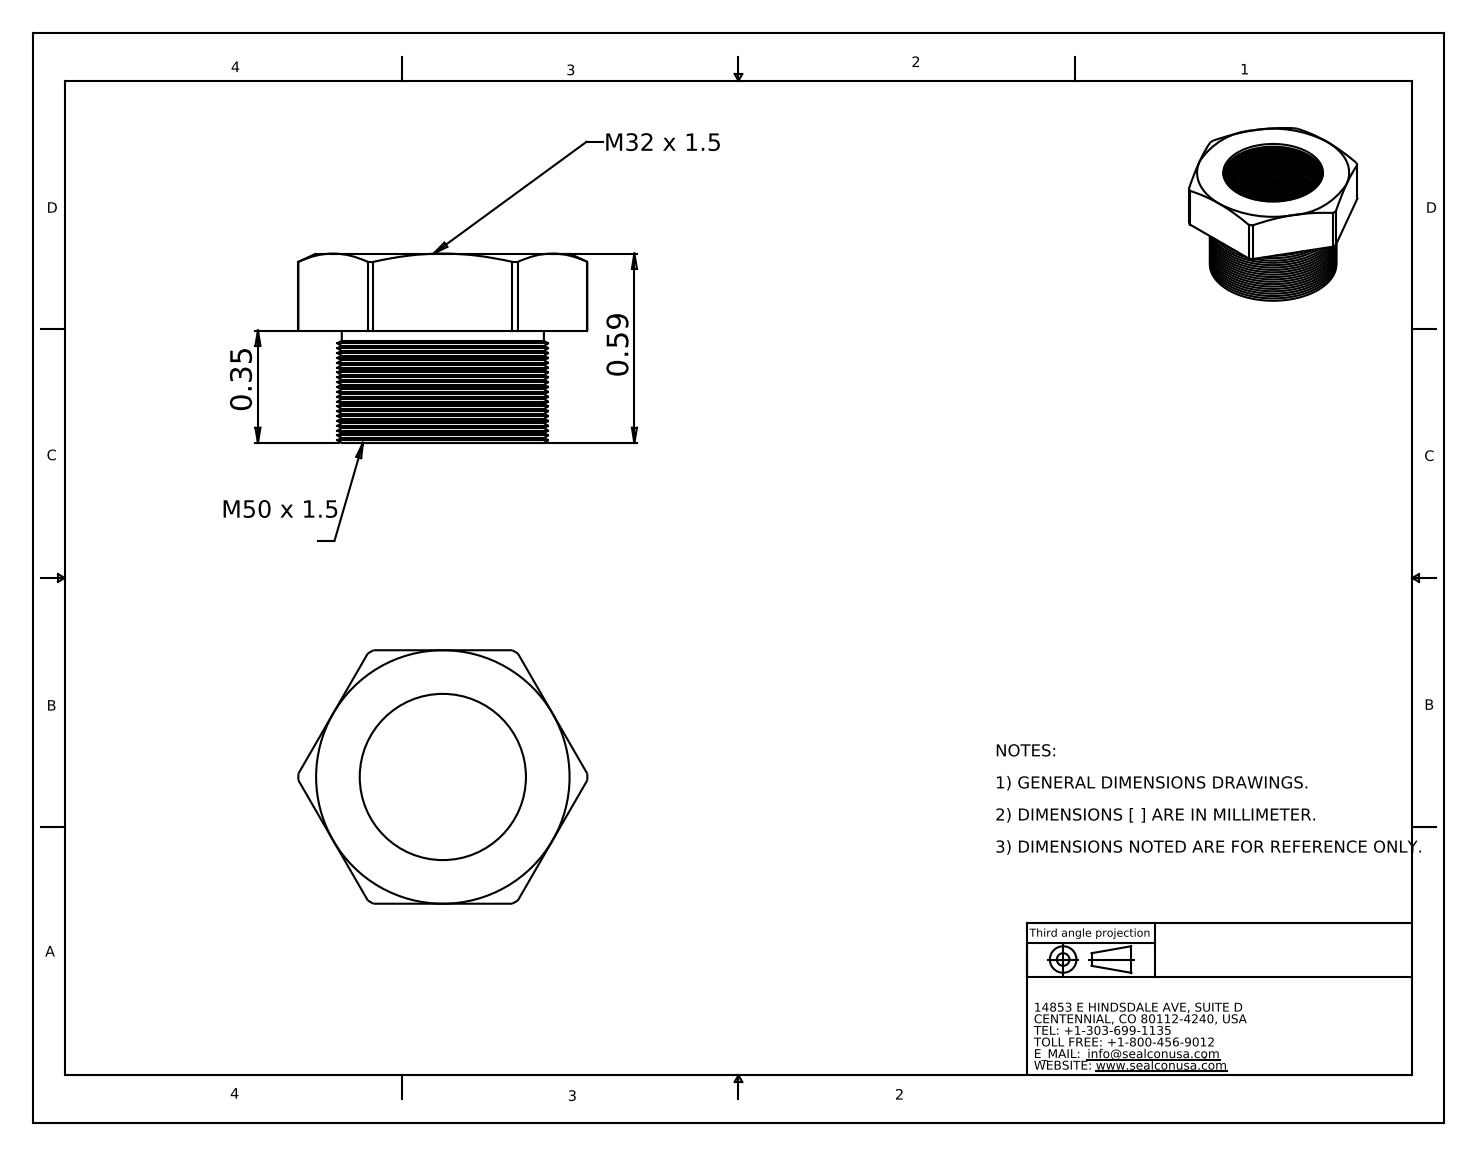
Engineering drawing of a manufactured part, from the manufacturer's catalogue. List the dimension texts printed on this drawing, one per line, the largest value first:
0.59
0.35
